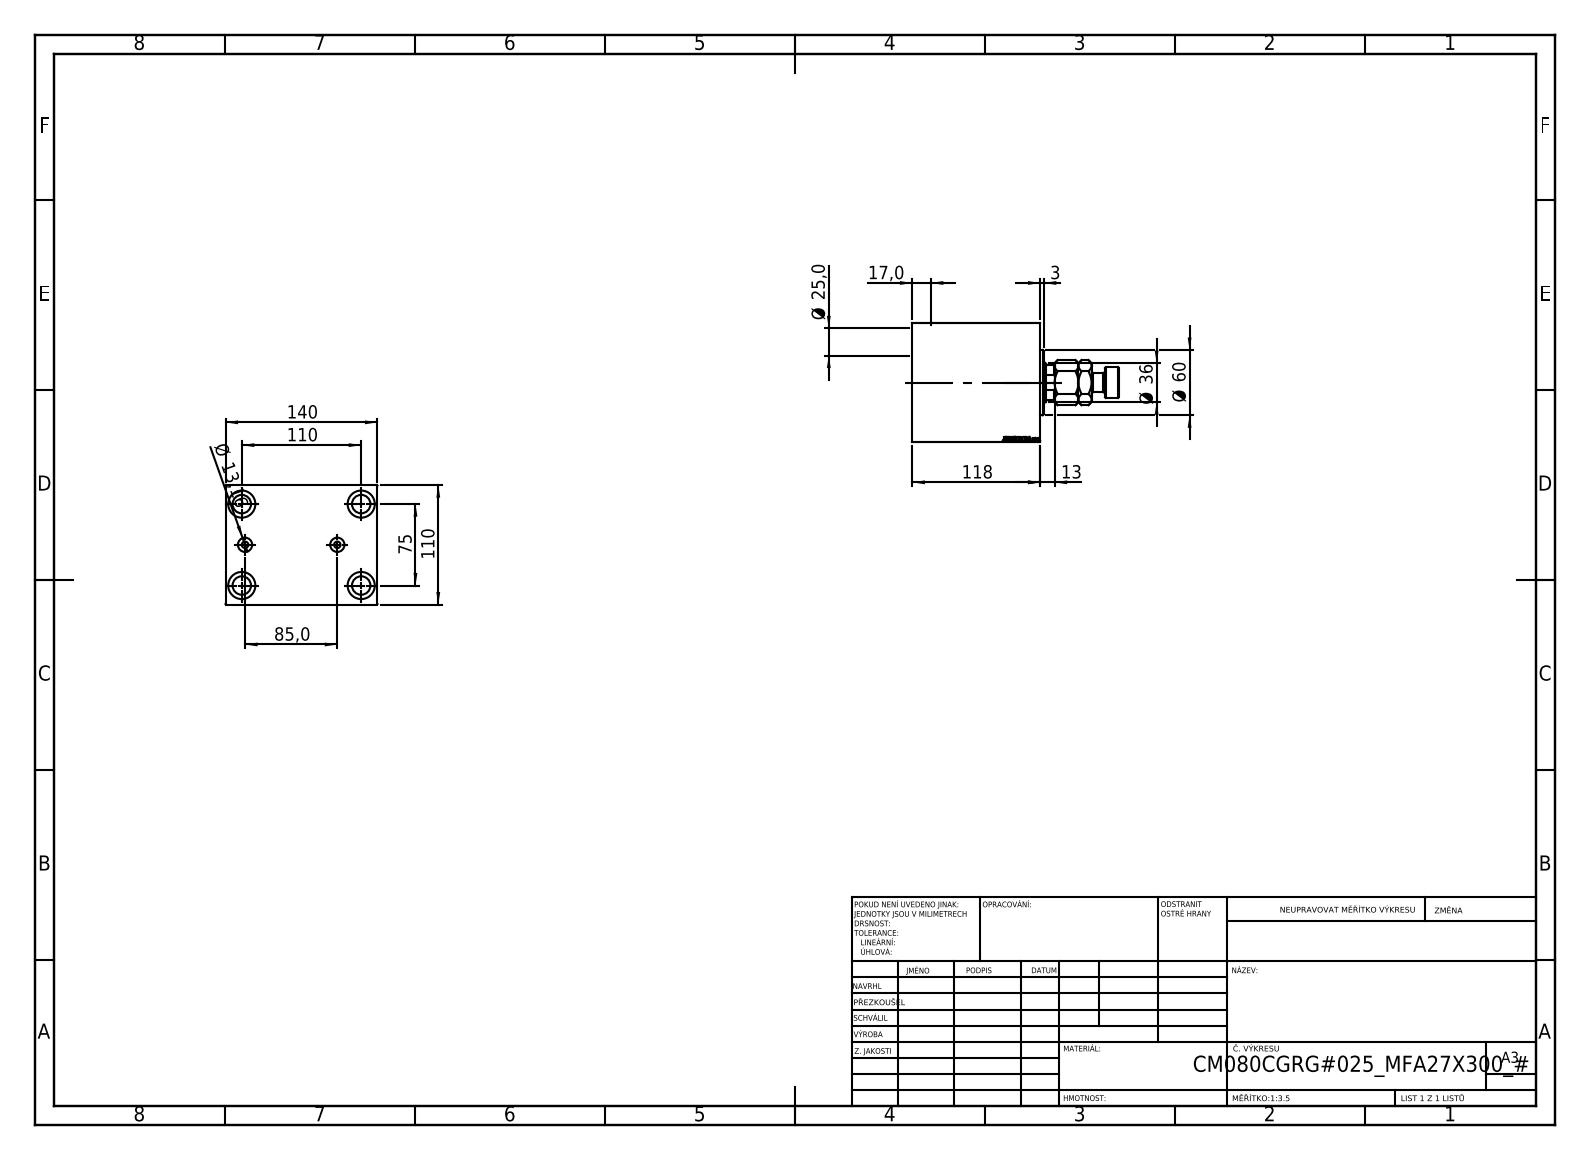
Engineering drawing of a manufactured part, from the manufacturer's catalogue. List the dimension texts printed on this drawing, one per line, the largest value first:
140
118
110
110
85,0
75
Ø 60
Ø 36
Ø 25,0
17,0
Ø 13,16
13
3
